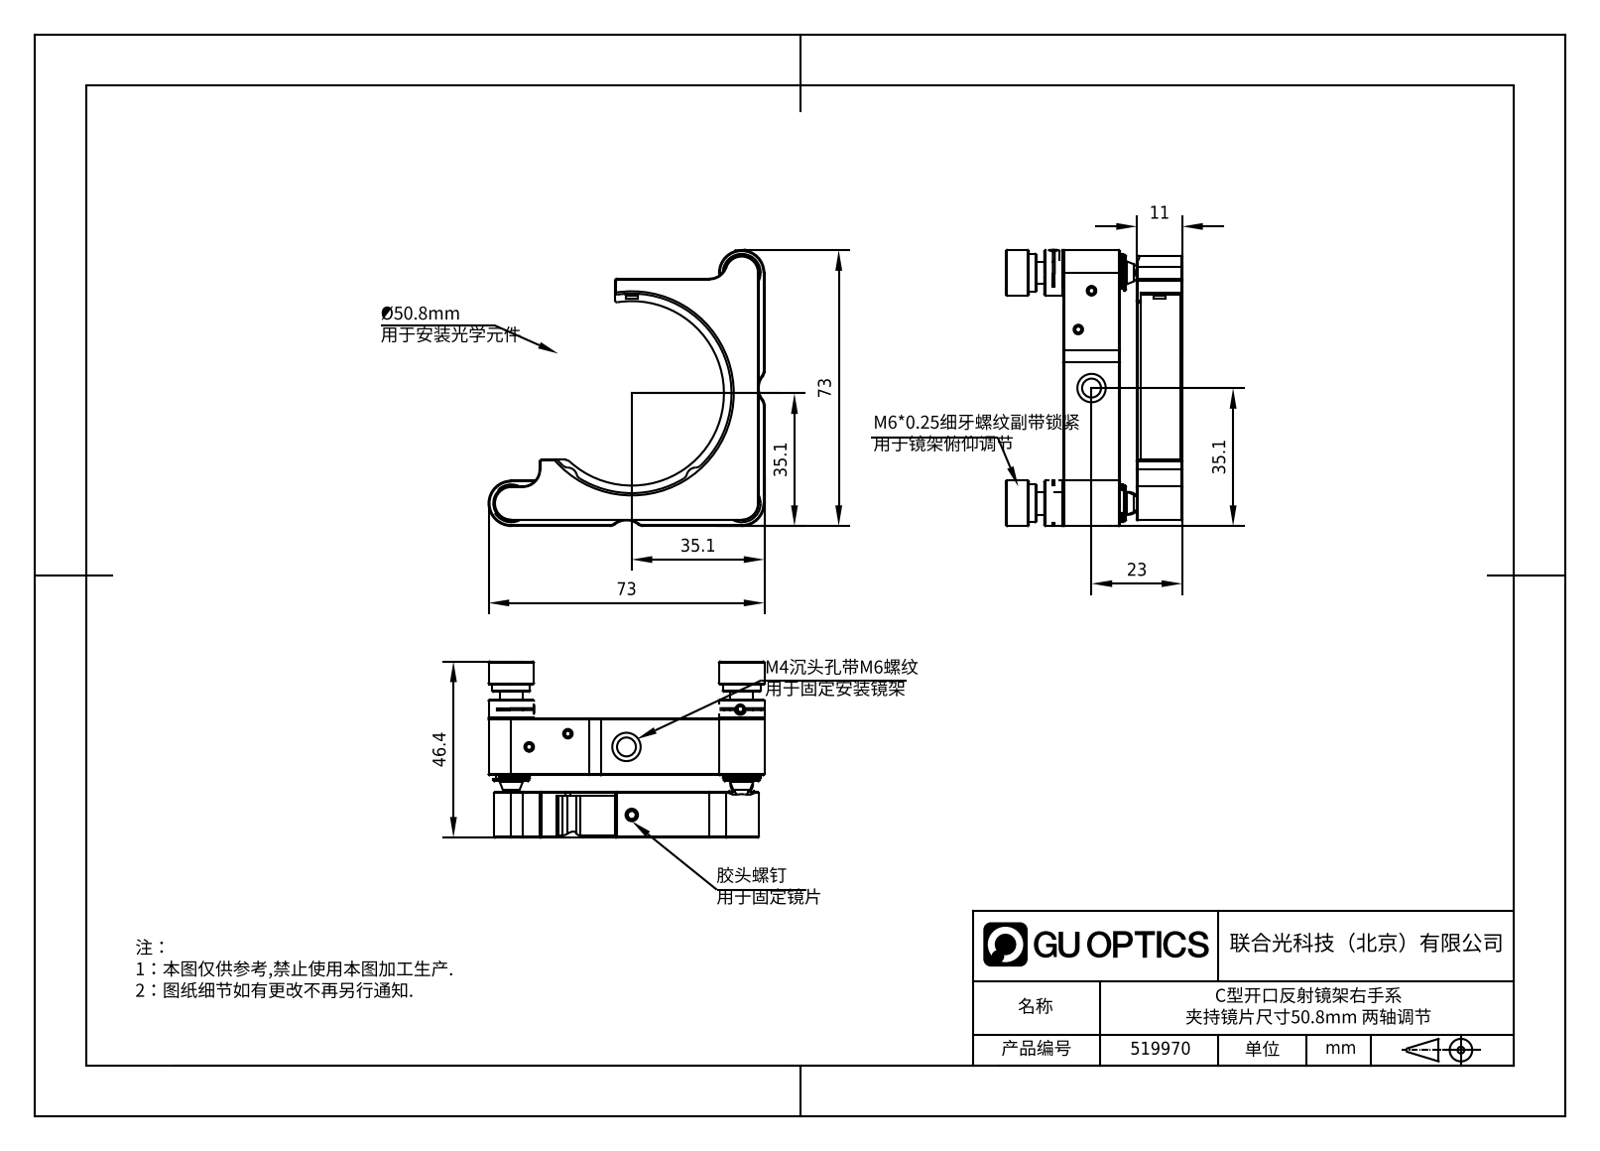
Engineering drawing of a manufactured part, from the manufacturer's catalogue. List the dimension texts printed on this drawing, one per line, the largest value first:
73
73
46.4
35.1
35.1
35.1
23
11
